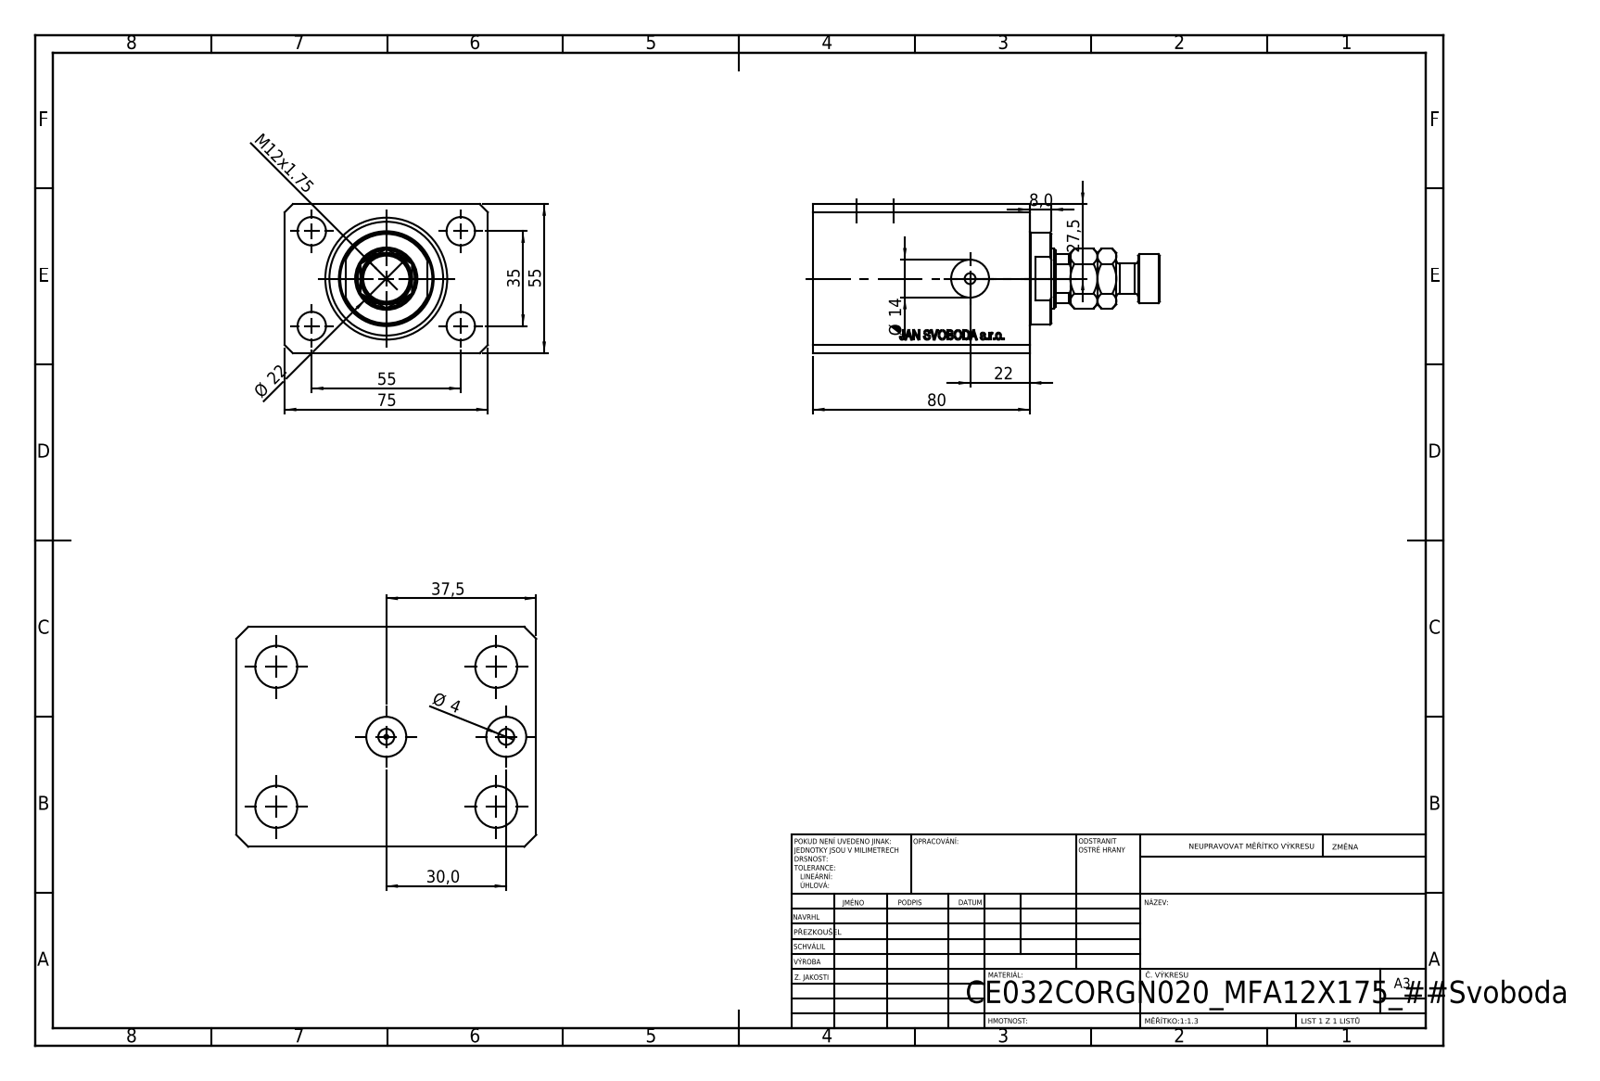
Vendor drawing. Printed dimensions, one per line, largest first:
80
75
55
55
37,5
35
30,0
27,5
Ø 22
22
Ø 14
M12x1.75
8,0
Ø 4
